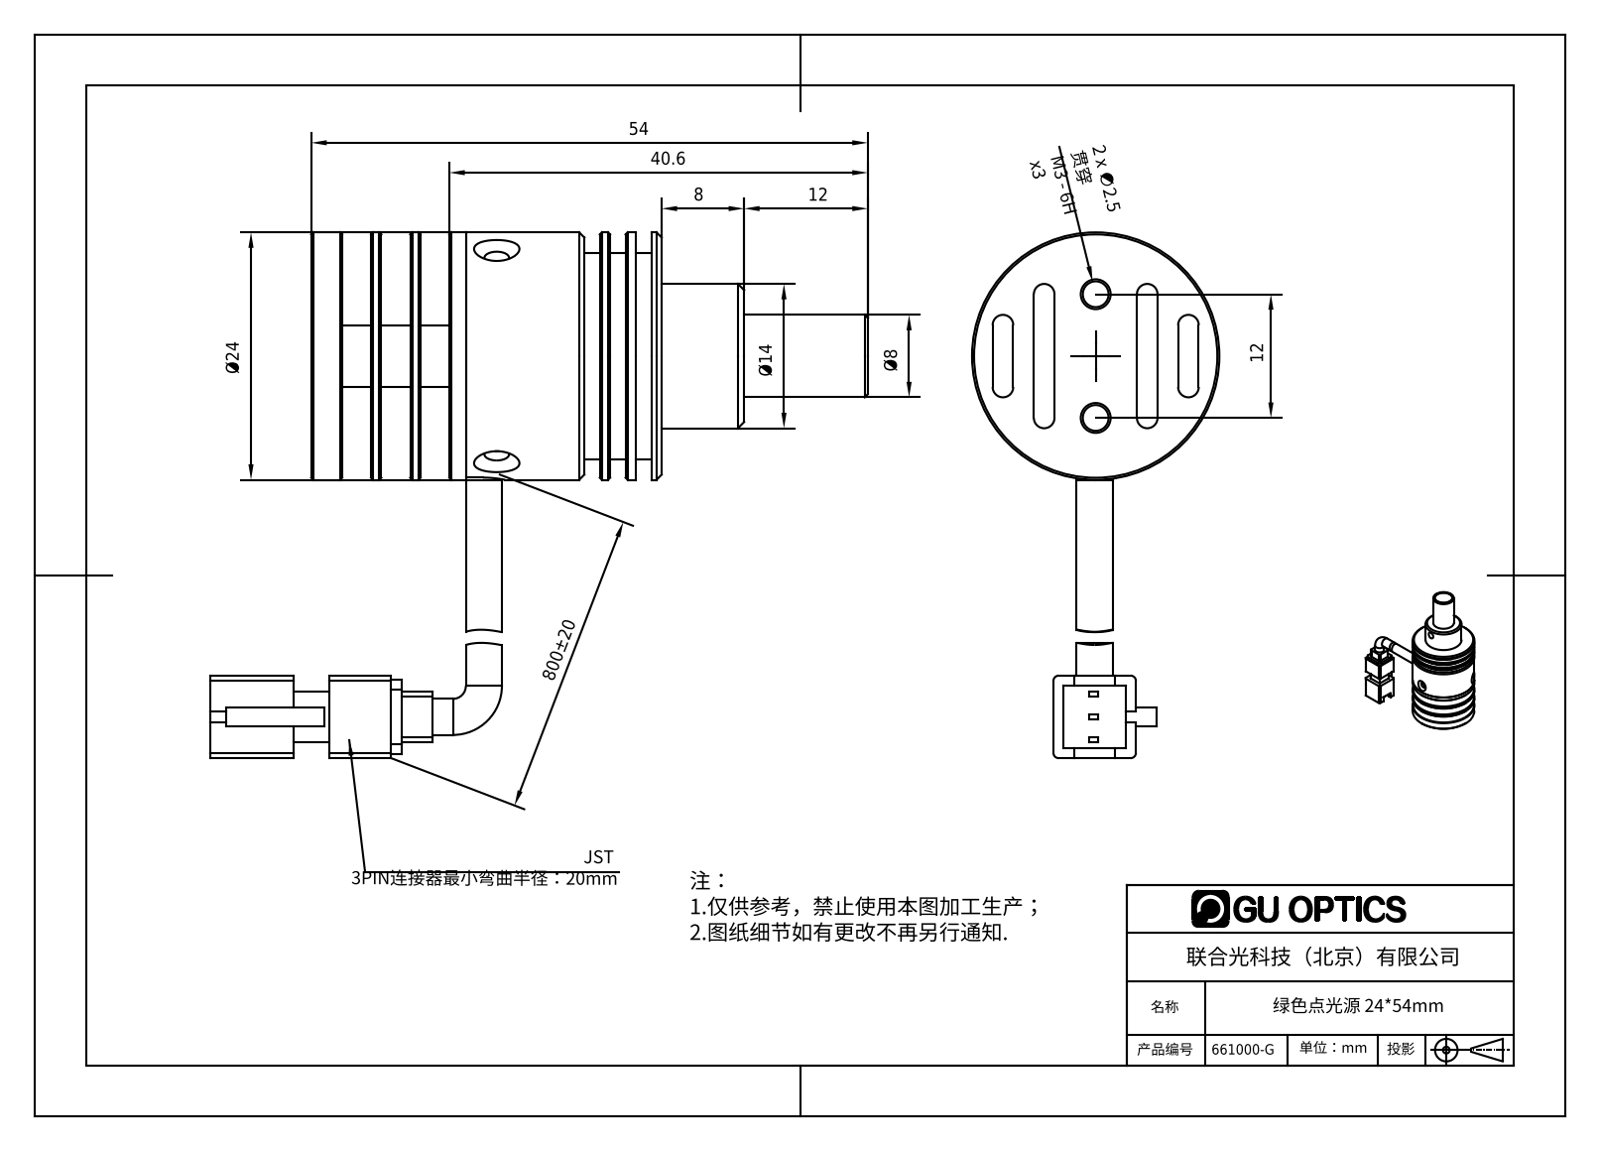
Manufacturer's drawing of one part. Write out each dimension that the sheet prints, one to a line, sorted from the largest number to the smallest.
800±20
54
40.6
Ø24
Ø14
12
12
Ø8
8
2 x ∅2.5 贯穿 M3 - 6H x3
